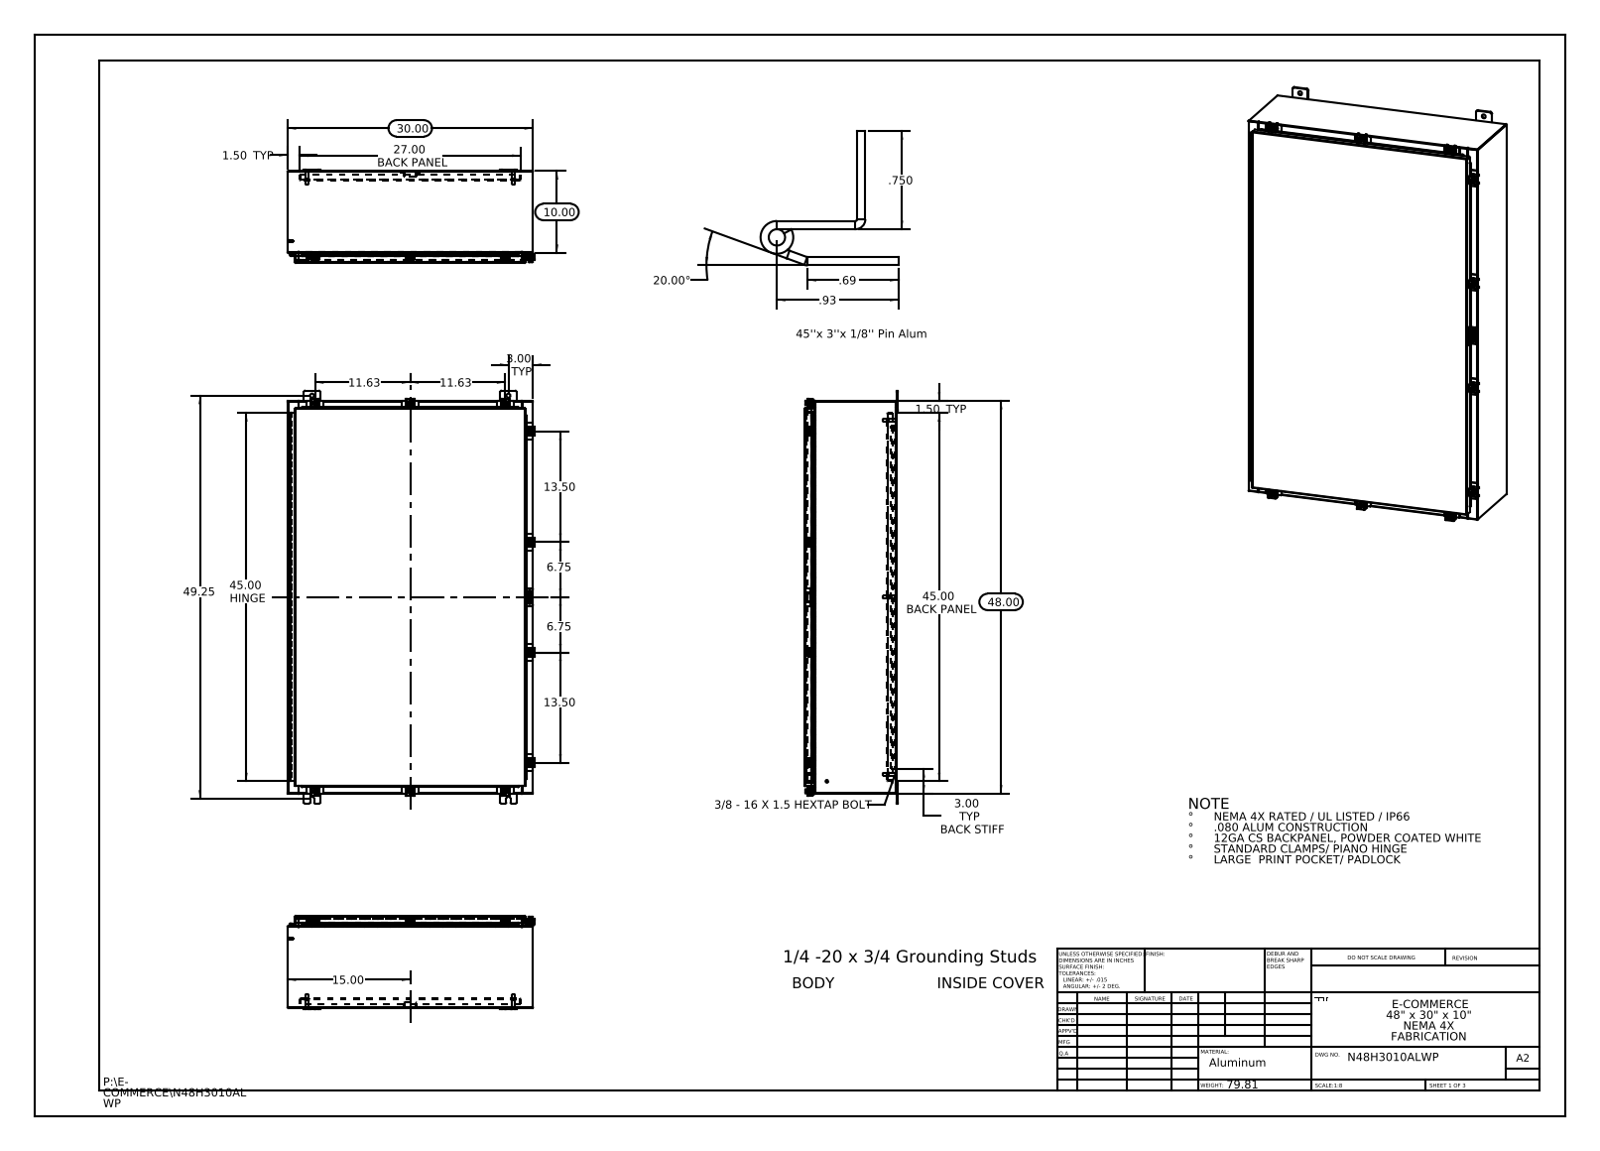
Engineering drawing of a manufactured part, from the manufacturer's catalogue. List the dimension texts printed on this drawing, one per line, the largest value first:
49.25
48.00
45.00 HINGE
45.00 BACK PANEL
30.00
27.00 BACK PANEL
20.00°
15.00
13.50
13.50
11.63
11.63
10.00
6.75
6.75
3.00 TYP
3.00 TYP BACK STIFF
1.50 TYP
1.50 TYP
.93
.750
.69
